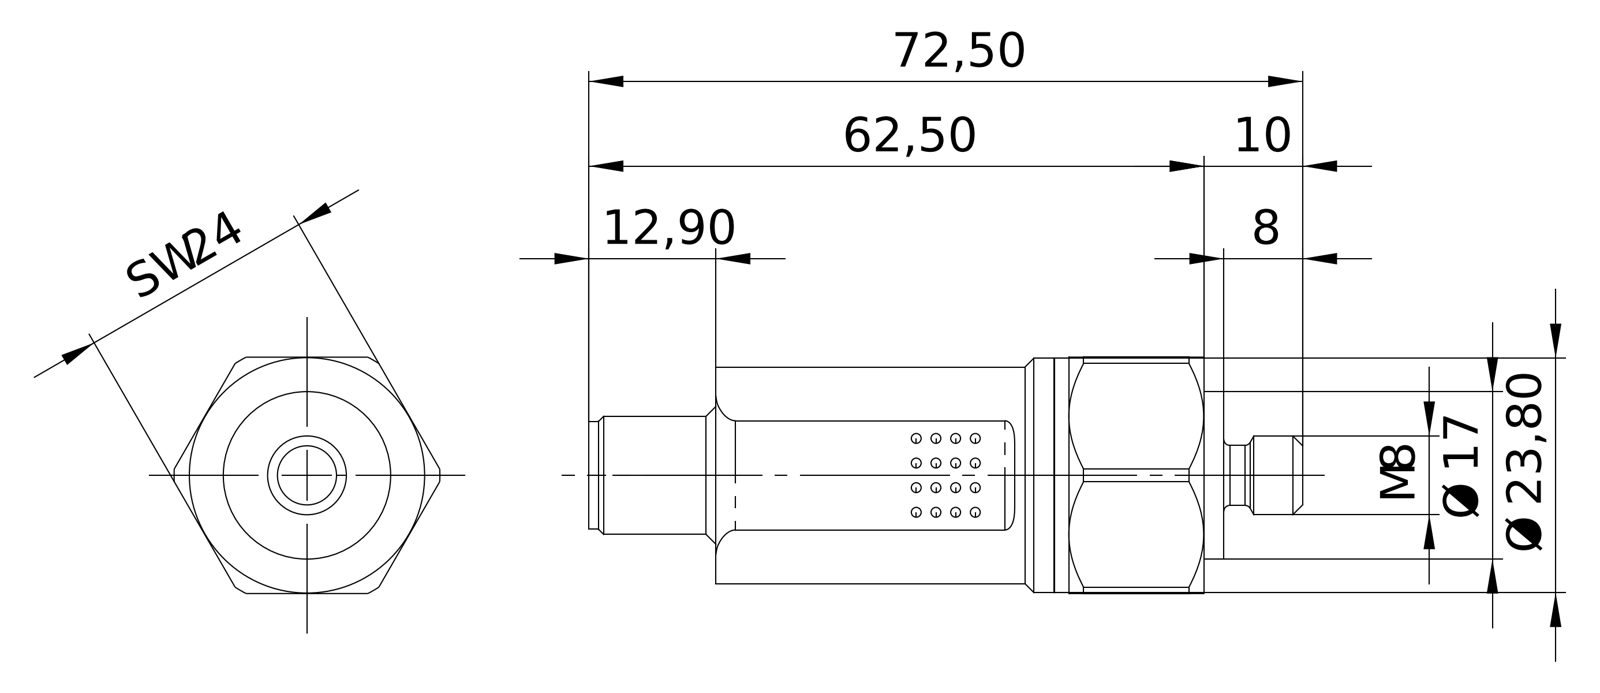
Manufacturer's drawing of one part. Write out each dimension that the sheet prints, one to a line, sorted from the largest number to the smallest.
72,50
62,50
SW 24
Ø 23,80
Ø 17
12,90
10
M 8
8
